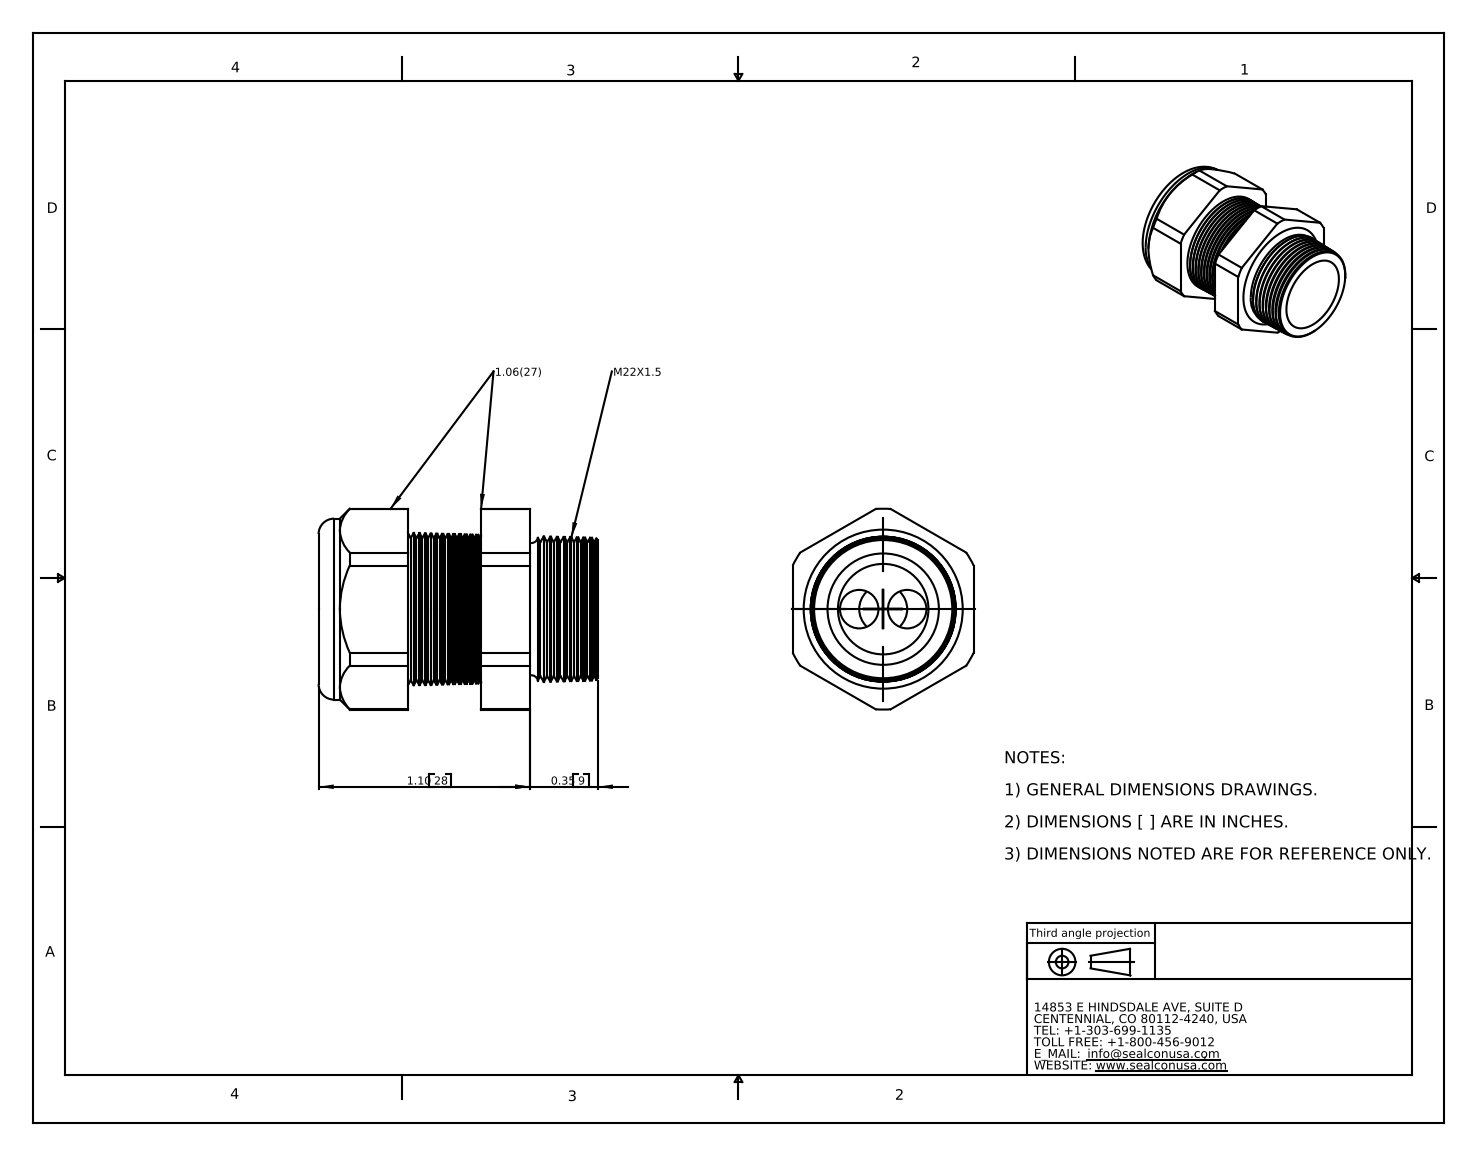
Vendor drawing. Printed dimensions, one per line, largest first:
1.10 28
0.35 9
